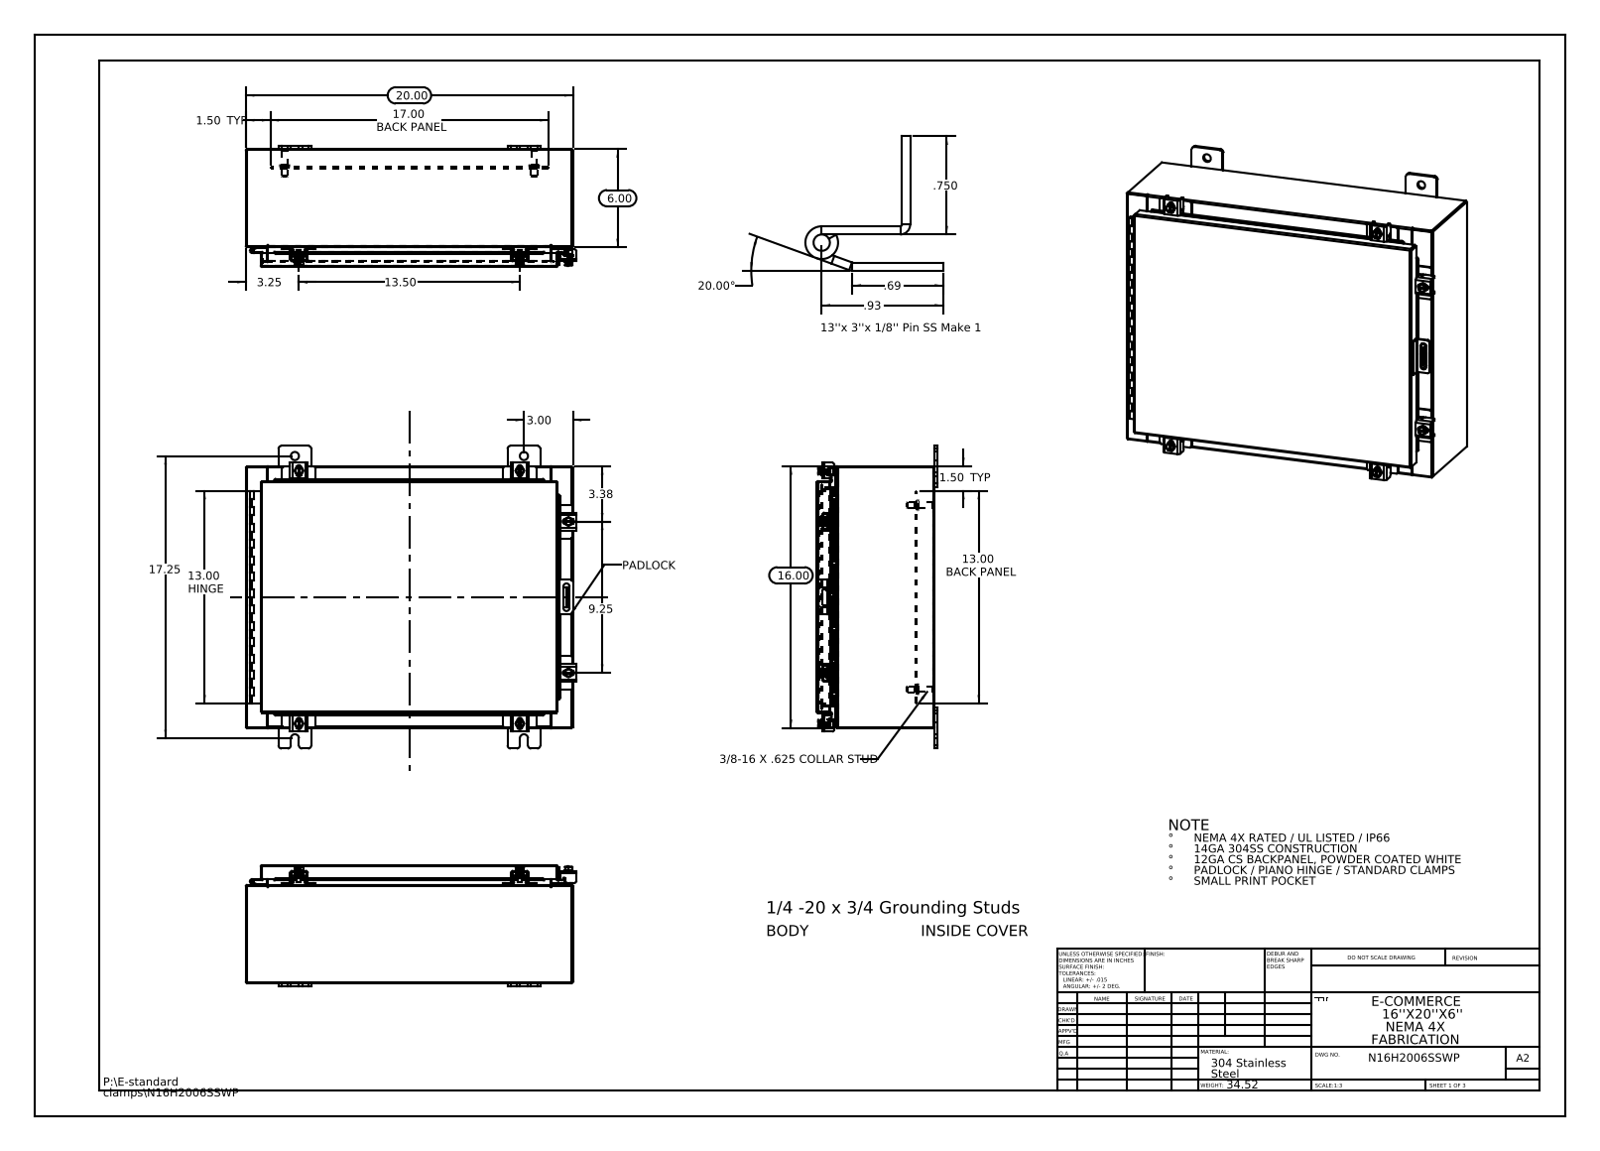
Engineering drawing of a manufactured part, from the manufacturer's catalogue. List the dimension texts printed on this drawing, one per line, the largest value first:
20.00
20.00°
17.25
17.00 BACK PANEL
16.00
13.50
13.00 HINGE
13.00 BACK PANEL
9.25
6.00
3.38
3.25
3.00
1.50 TYP
1.50 TYP
.93
.750
.69
